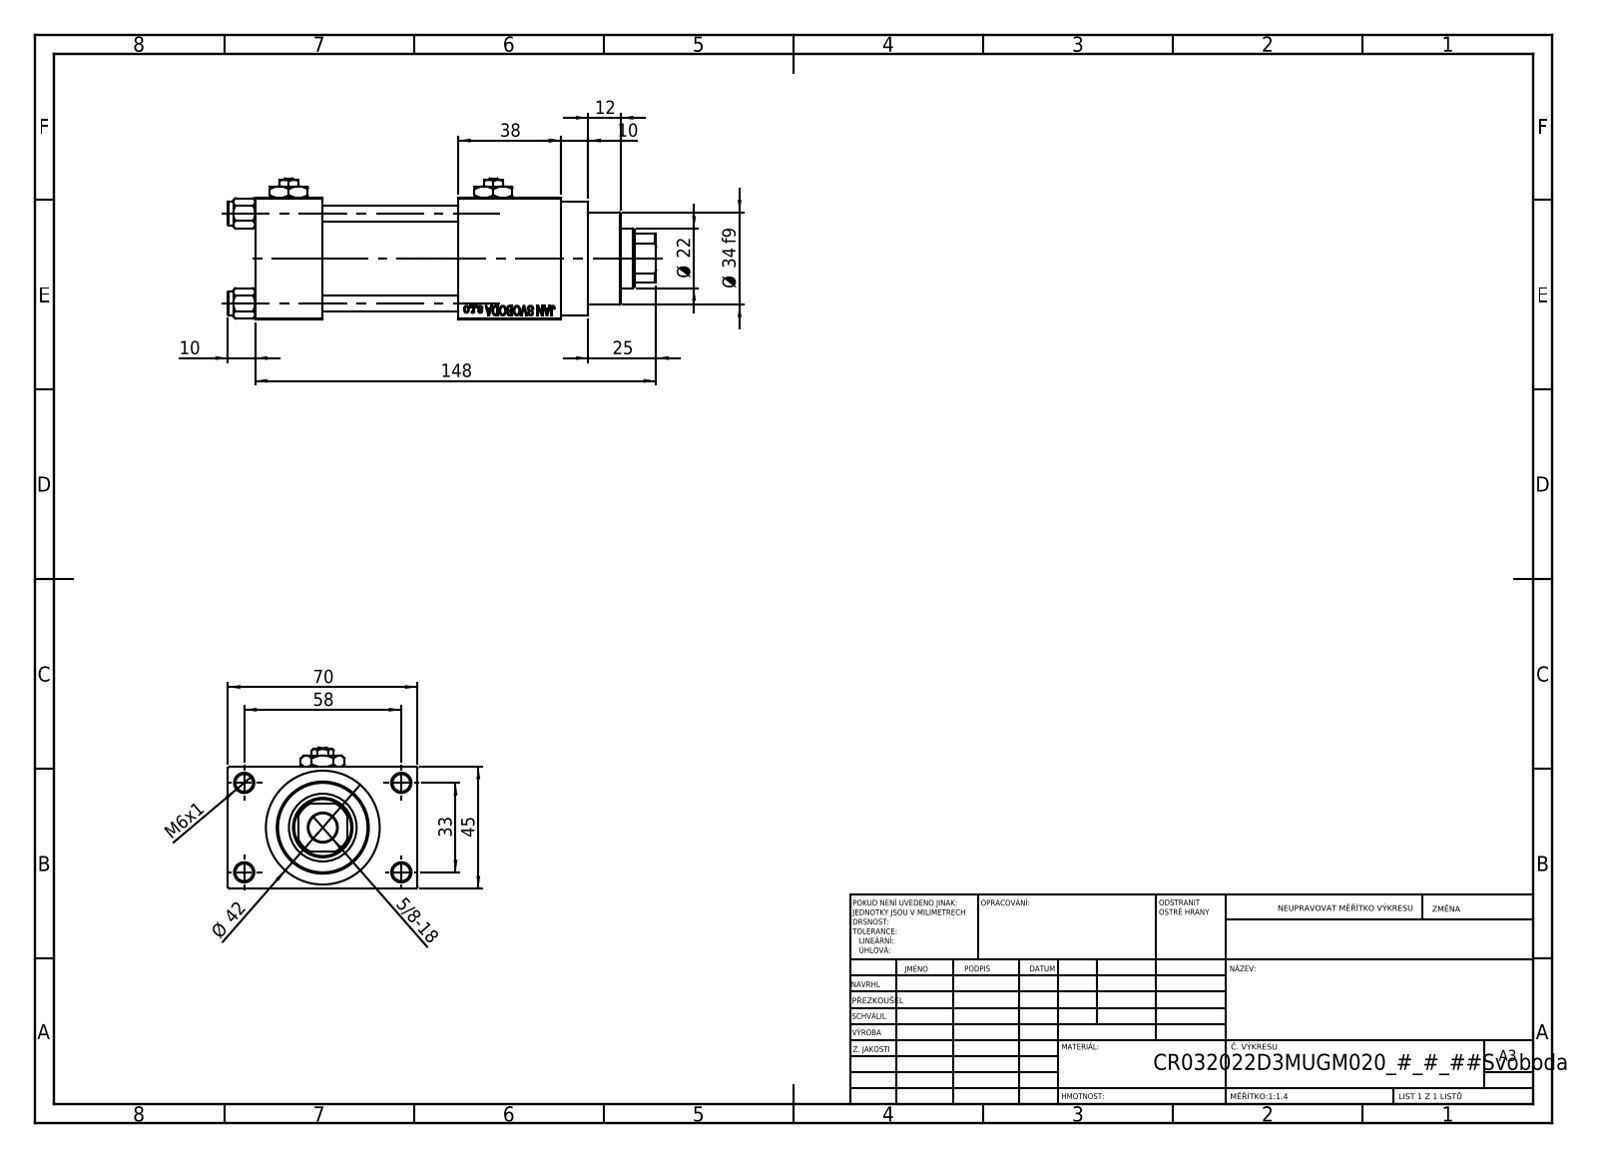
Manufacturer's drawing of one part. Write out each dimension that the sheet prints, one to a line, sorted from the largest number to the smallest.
148
70
58
45
Ø 42
38
Ø 34 f9
33
25
Ø 22
12
10
10
M6x1
5/8-18
